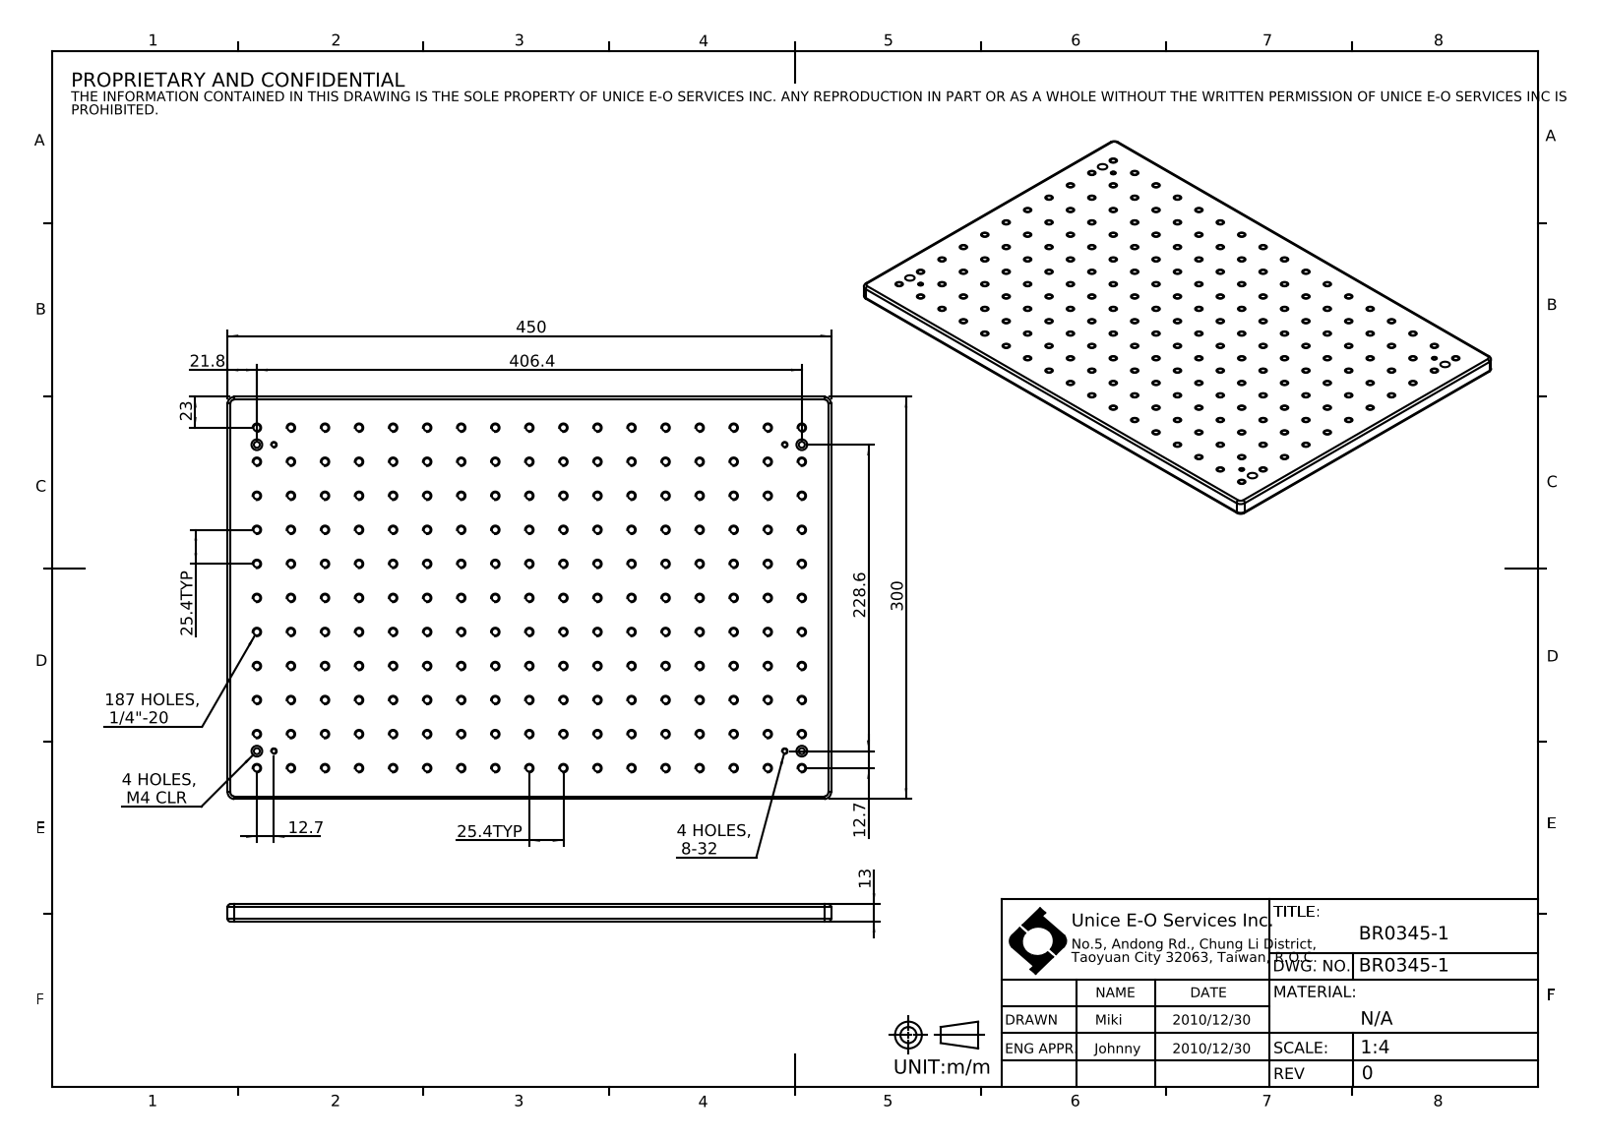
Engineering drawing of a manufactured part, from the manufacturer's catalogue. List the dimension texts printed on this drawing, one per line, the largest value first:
450
406.4
300
228.6
187 HOLES, 1/4"-20
25.4 TYP
25.4 TYP
23
21.8
13
12.7
12.7
4 HOLES, 8-32
4 HOLES, M4 CLR
